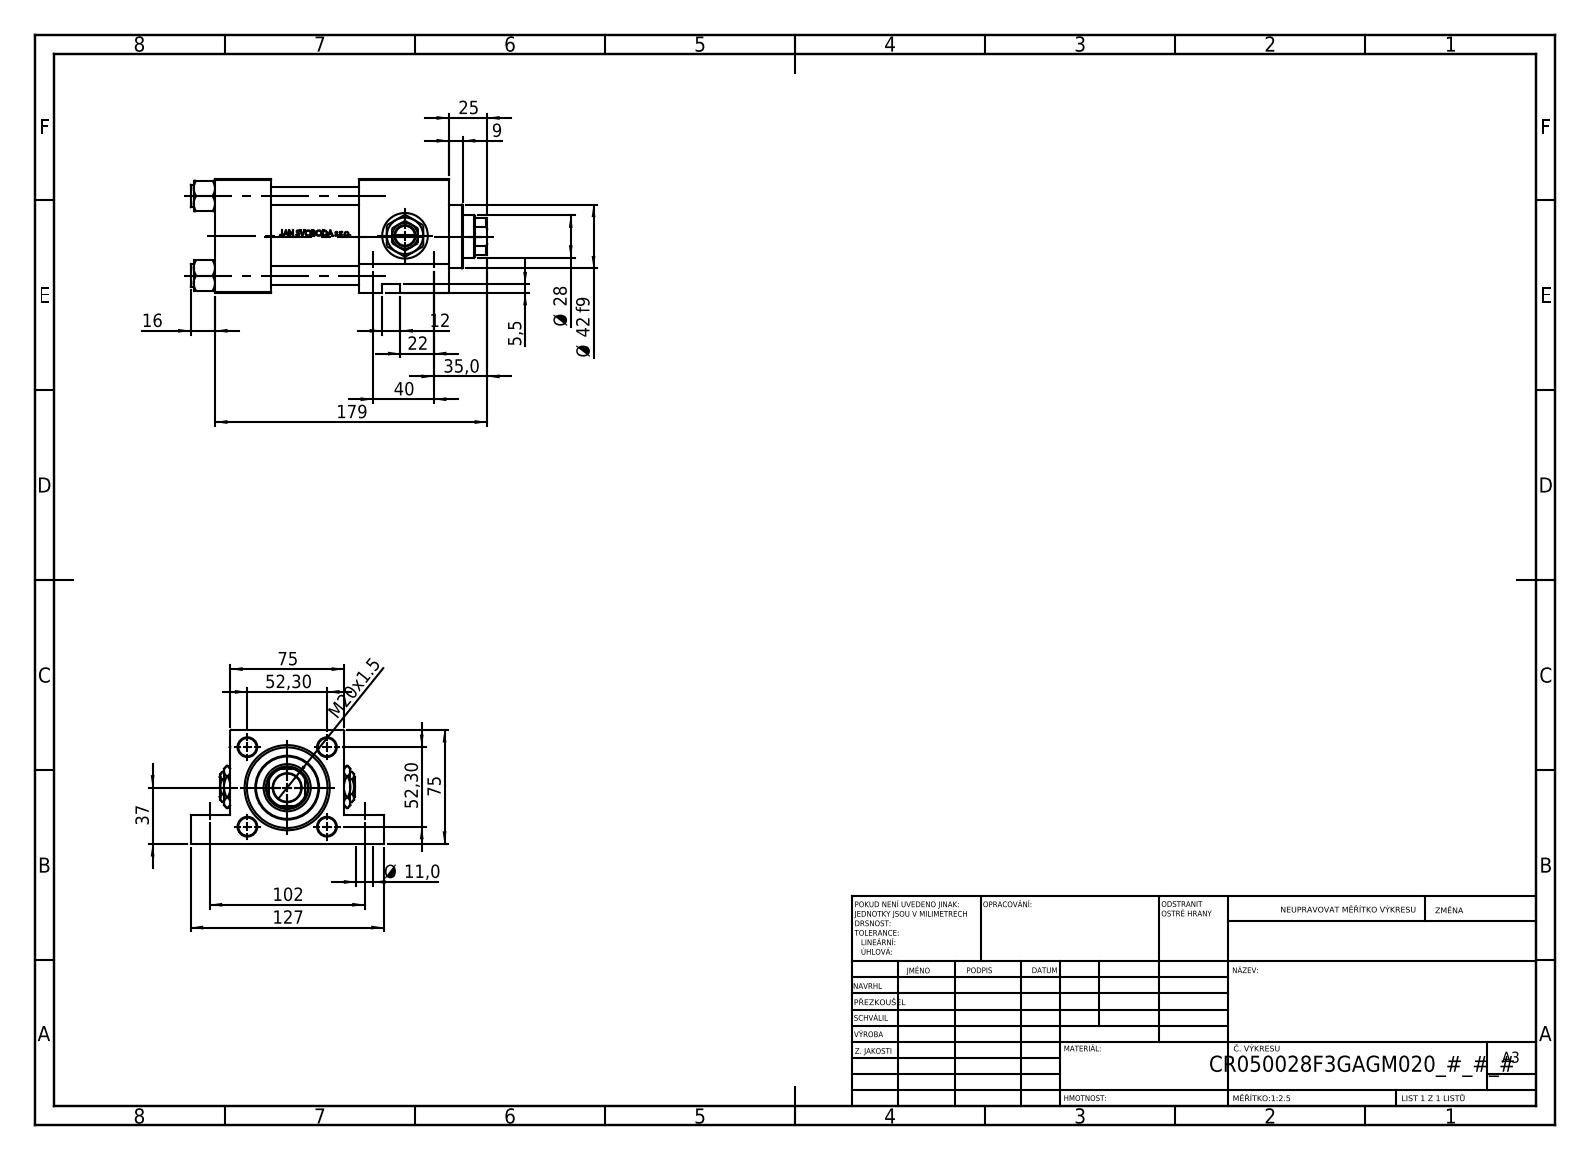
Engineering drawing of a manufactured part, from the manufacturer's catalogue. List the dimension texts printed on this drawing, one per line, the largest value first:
179
127
102
75
75
52,30
52,30
Ø 42 f9
40
37
35,0
Ø 28
25
22
M20x1.5
16
12
Ø 11,0
9
5,5
